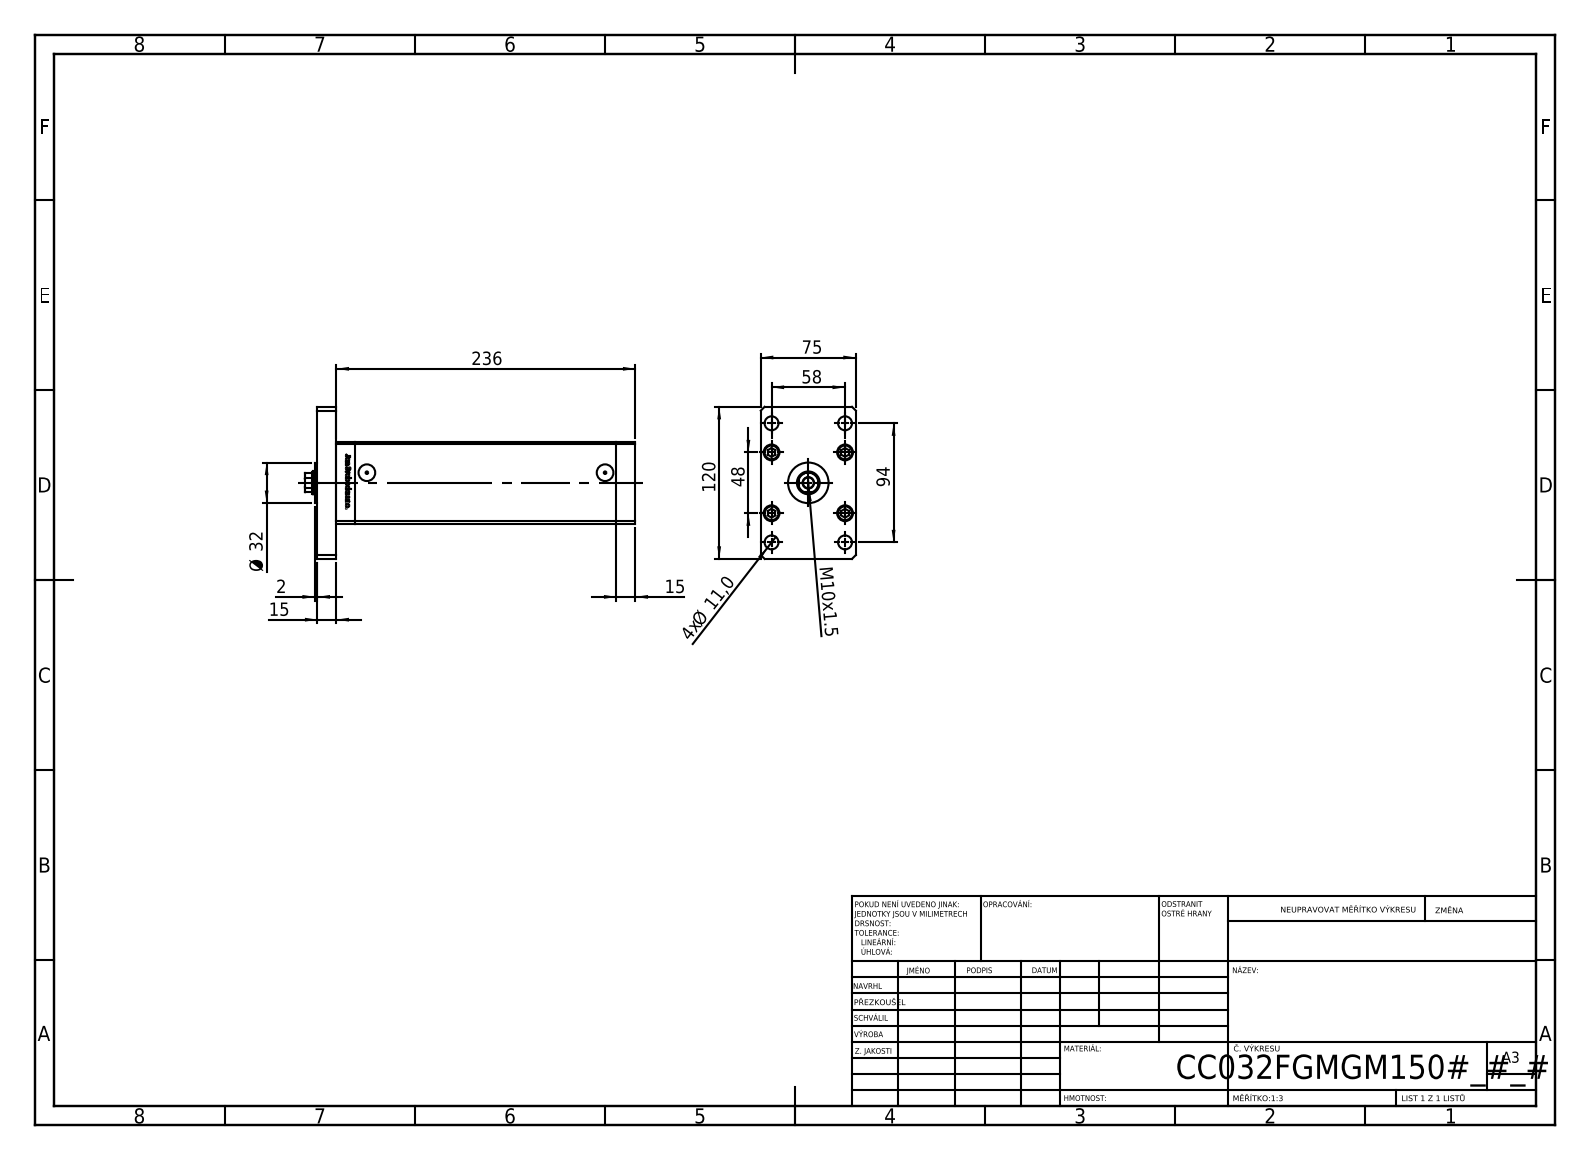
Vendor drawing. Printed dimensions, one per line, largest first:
236
120
94
75
58
48
Ø 32
15
15
4x Ø 11,0
M10x1.5
2
